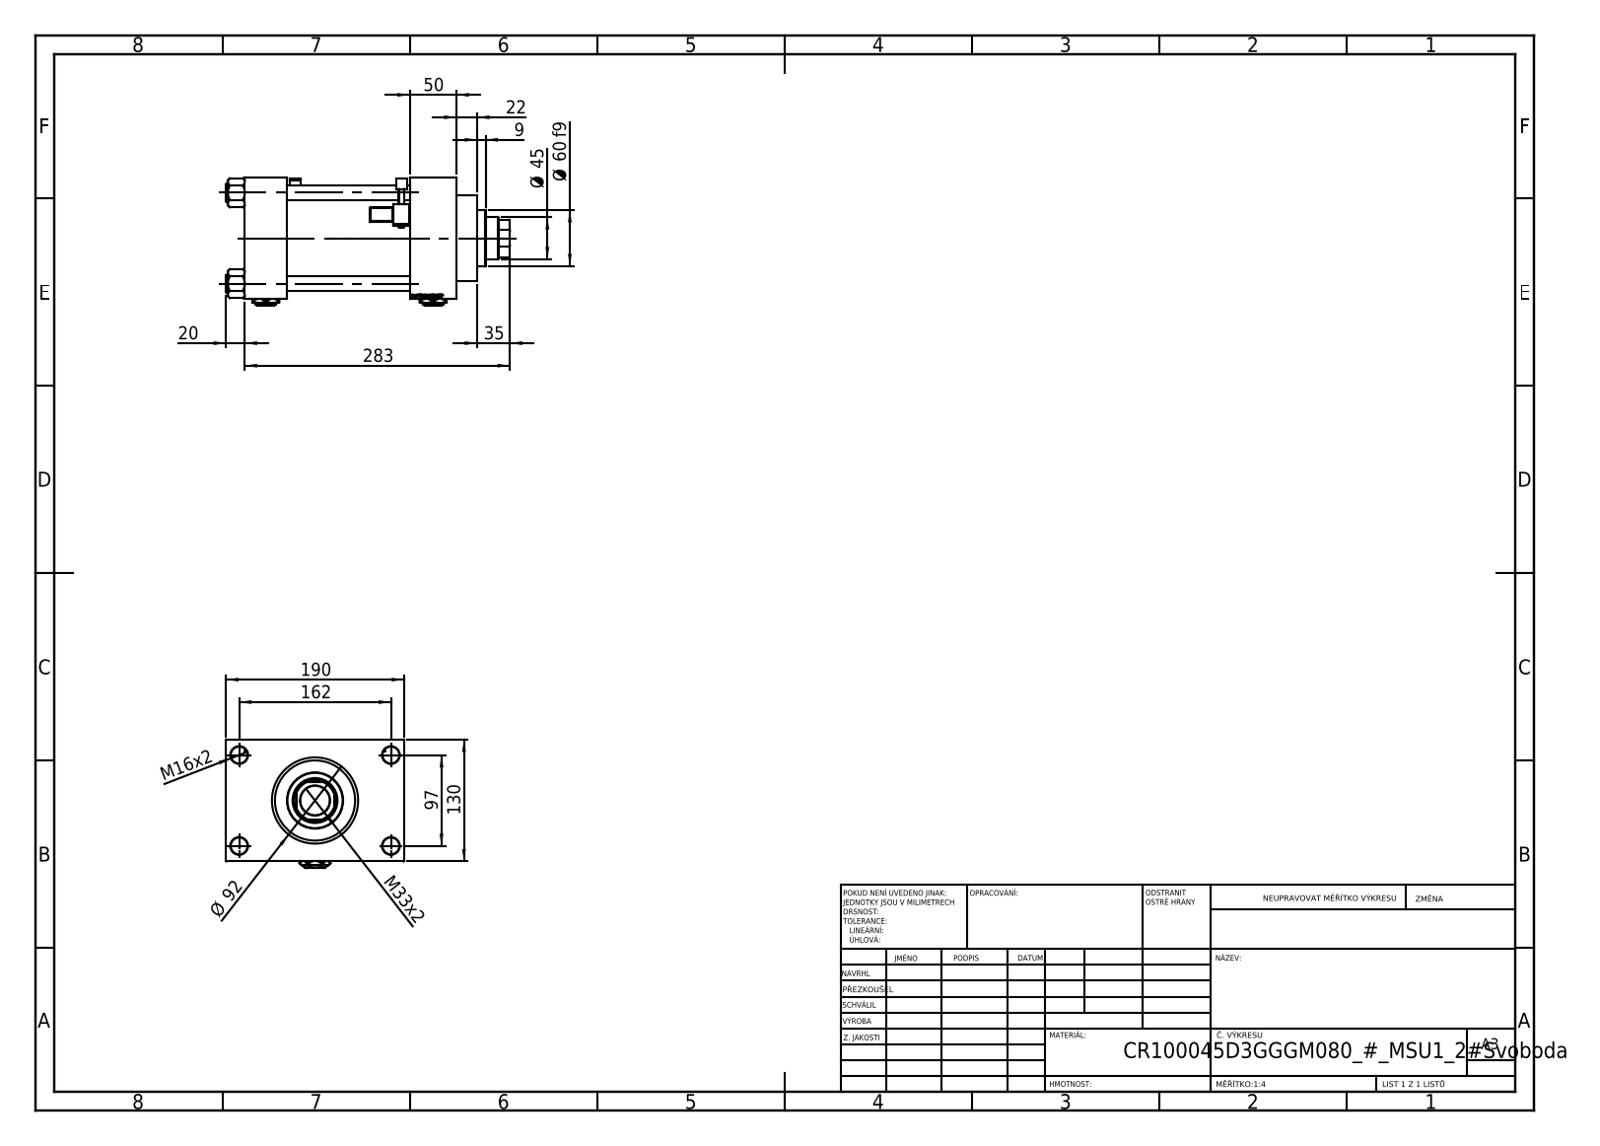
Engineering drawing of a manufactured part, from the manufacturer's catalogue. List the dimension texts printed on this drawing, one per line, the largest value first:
283
190
162
130
97
Ø 92
Ø 60 f9
50
Ø 45
35
M33x2
22
20
M16x2
9
